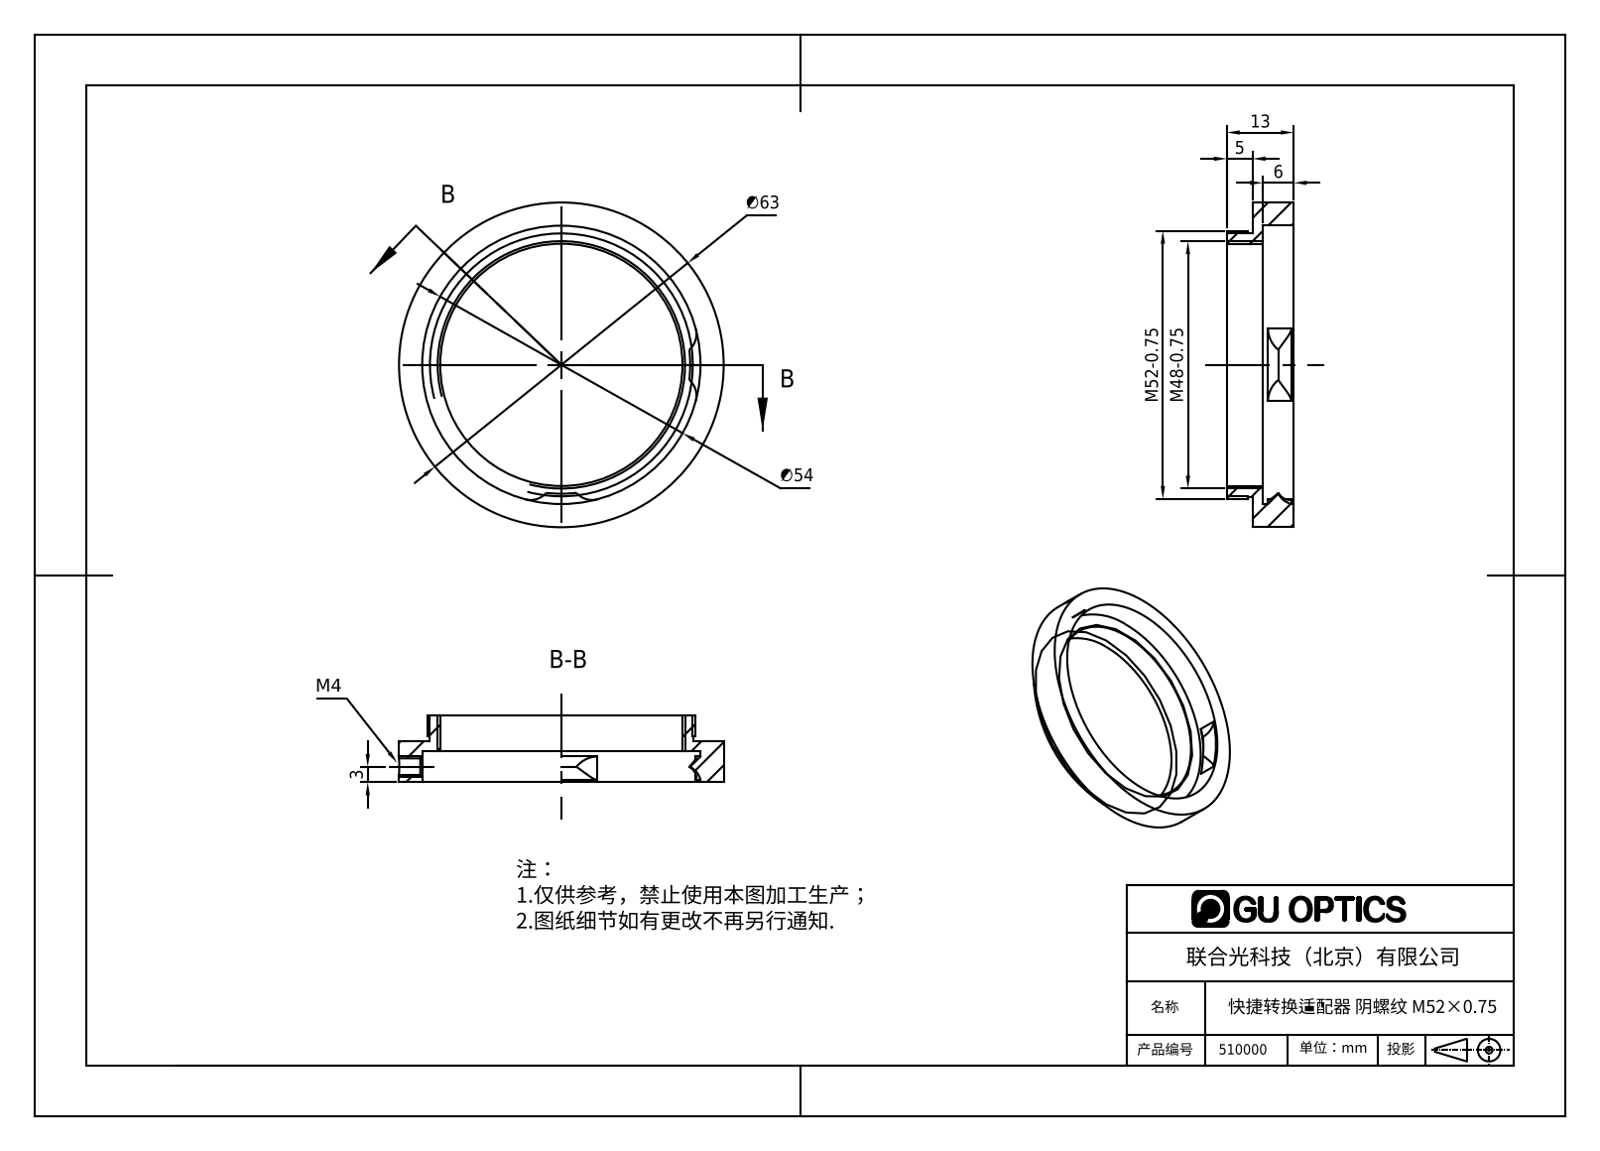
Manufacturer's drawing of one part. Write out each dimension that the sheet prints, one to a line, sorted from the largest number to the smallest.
∅63
∅54
M52-0.75
M48-0.75
13
6
5
3
